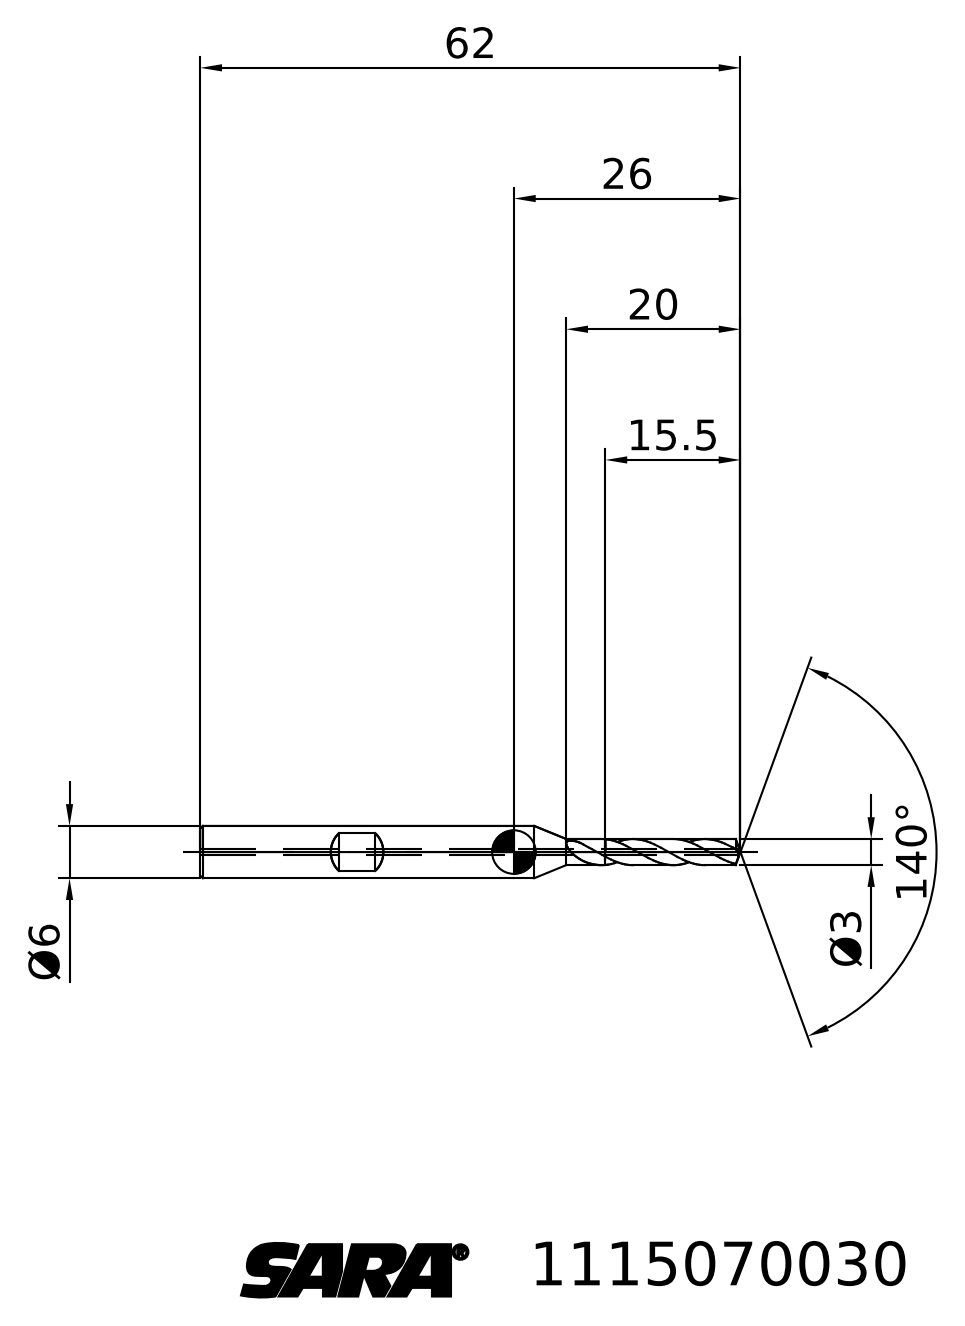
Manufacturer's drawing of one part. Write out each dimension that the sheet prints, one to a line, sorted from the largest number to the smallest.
140°
62
26
20
15.5
Ø6
Ø3
